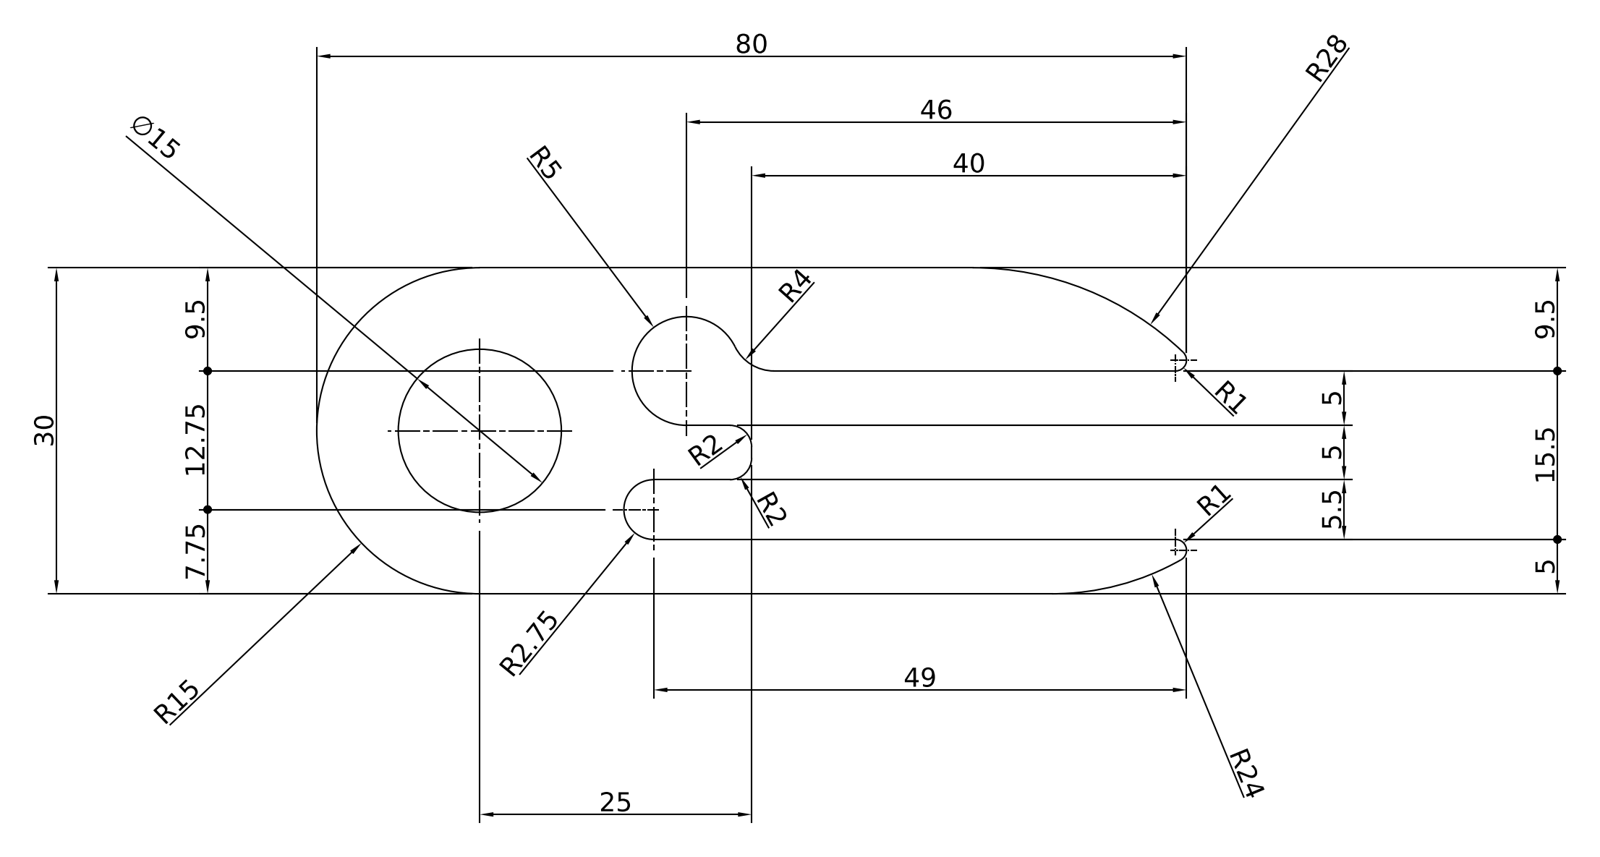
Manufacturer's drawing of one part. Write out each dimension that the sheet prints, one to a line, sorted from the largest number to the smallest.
80
49
46
40
30
R28
25
R24
15.5
R15
∅15
12.75
9.5
9.5
7.75
5.5
5
5
5
R5
R4
R2.75
R2
R2
R1
R1
